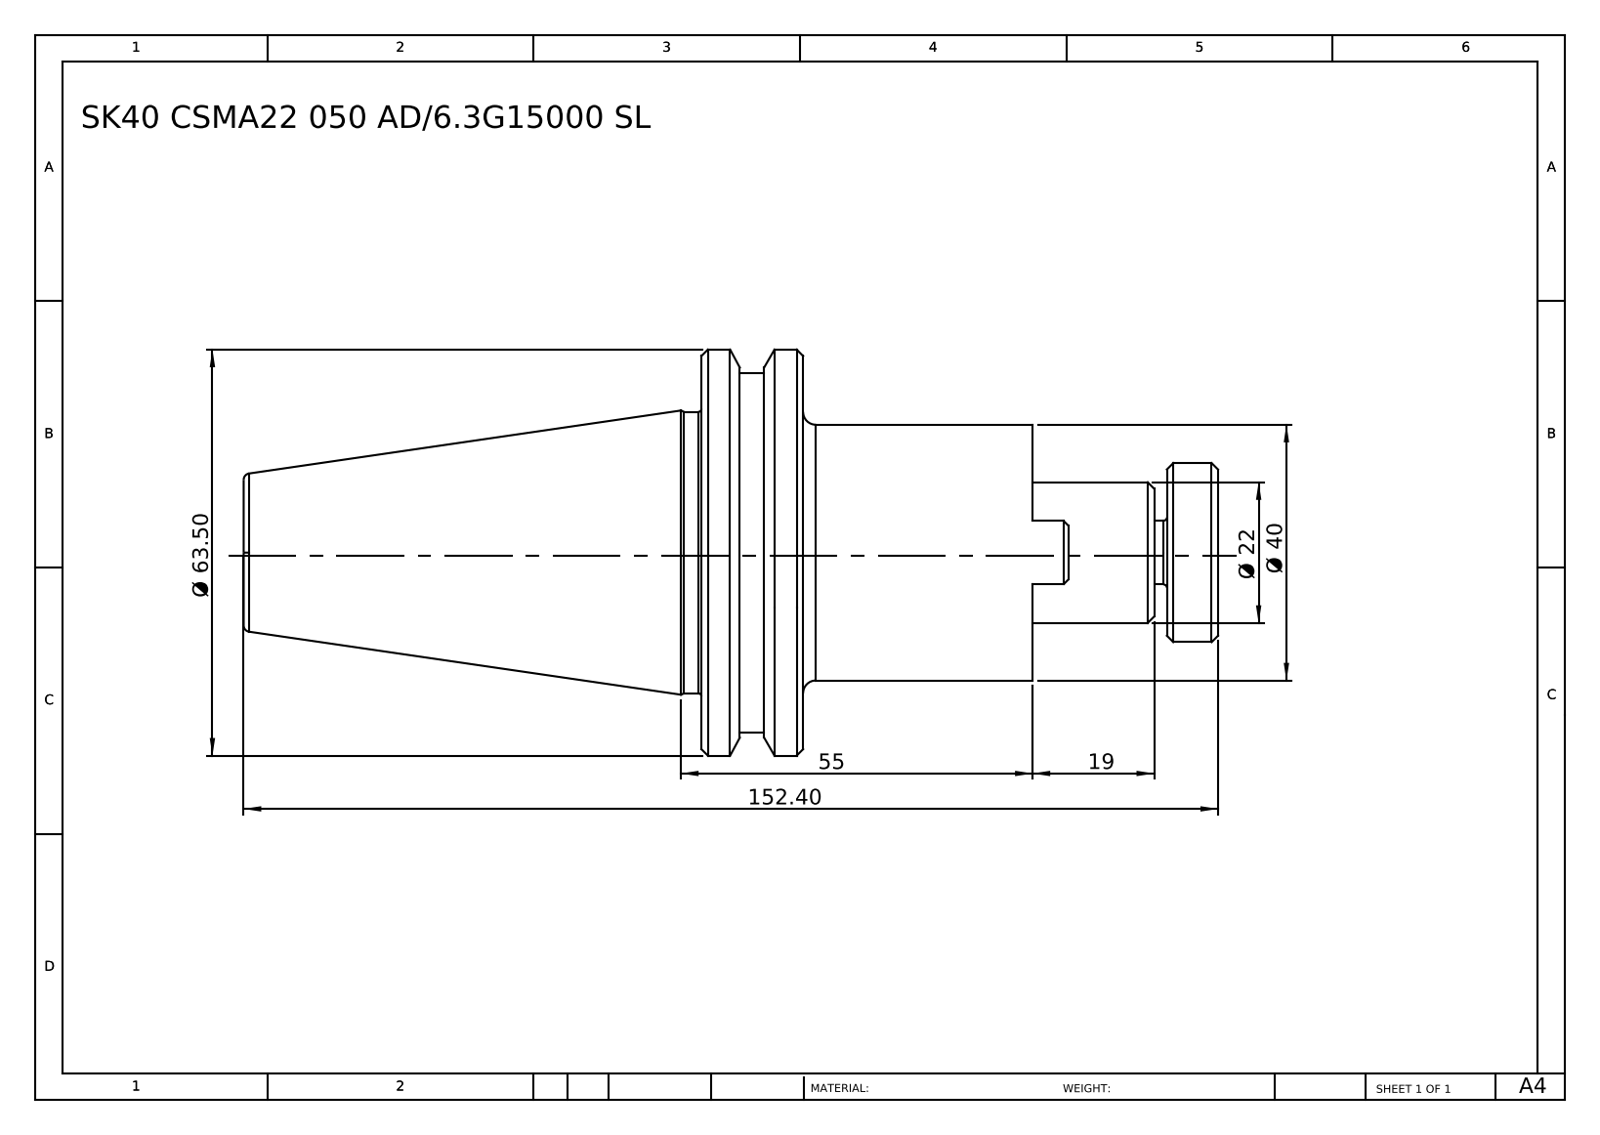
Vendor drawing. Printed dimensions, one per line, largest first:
152.40
Ø 63.50
55
Ø 40
Ø 22
19
